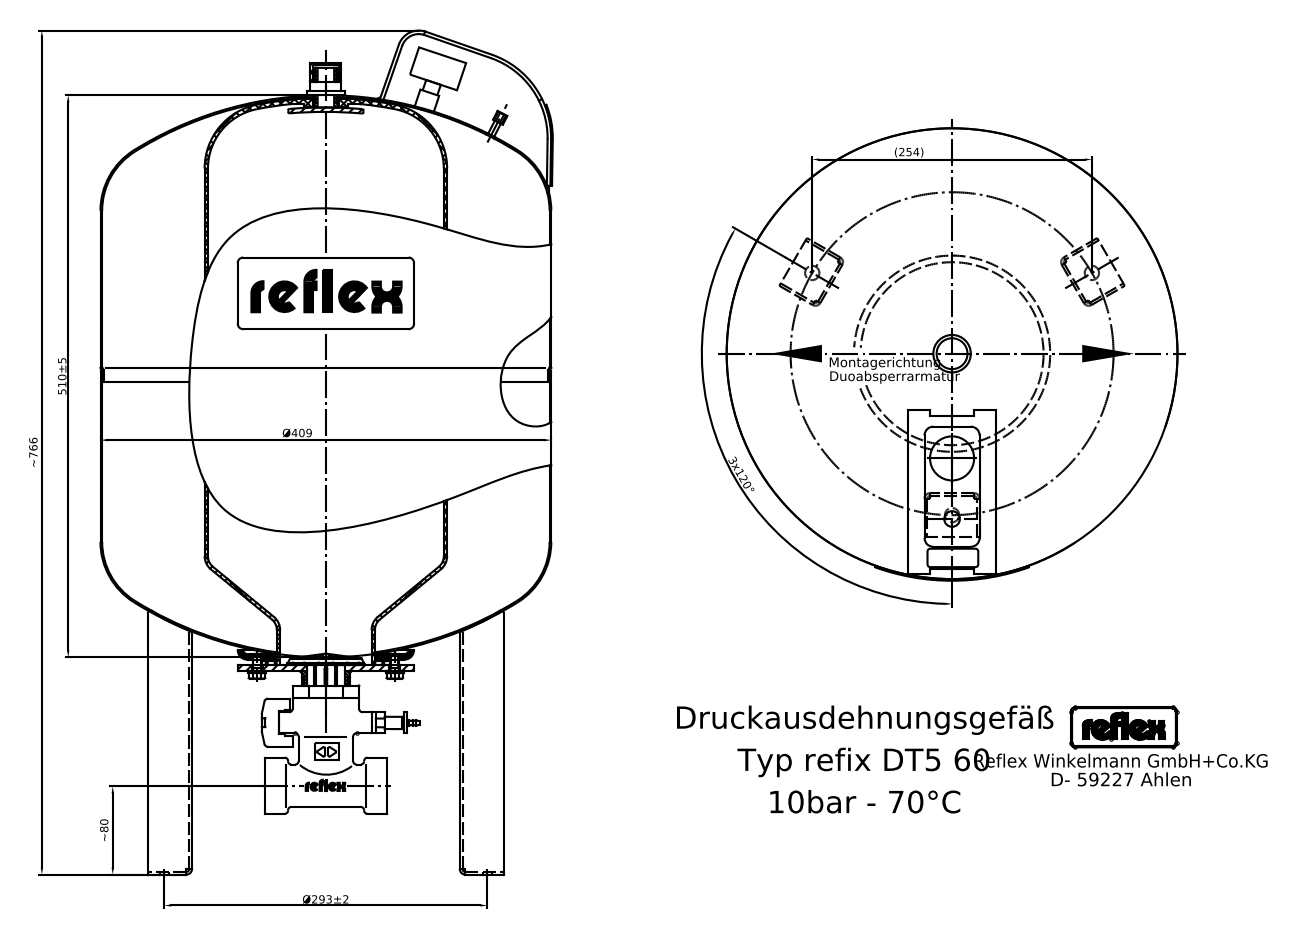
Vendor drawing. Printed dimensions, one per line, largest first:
~766
510±5
Ø409
Ø293±2
(254)
3x120°
~80
